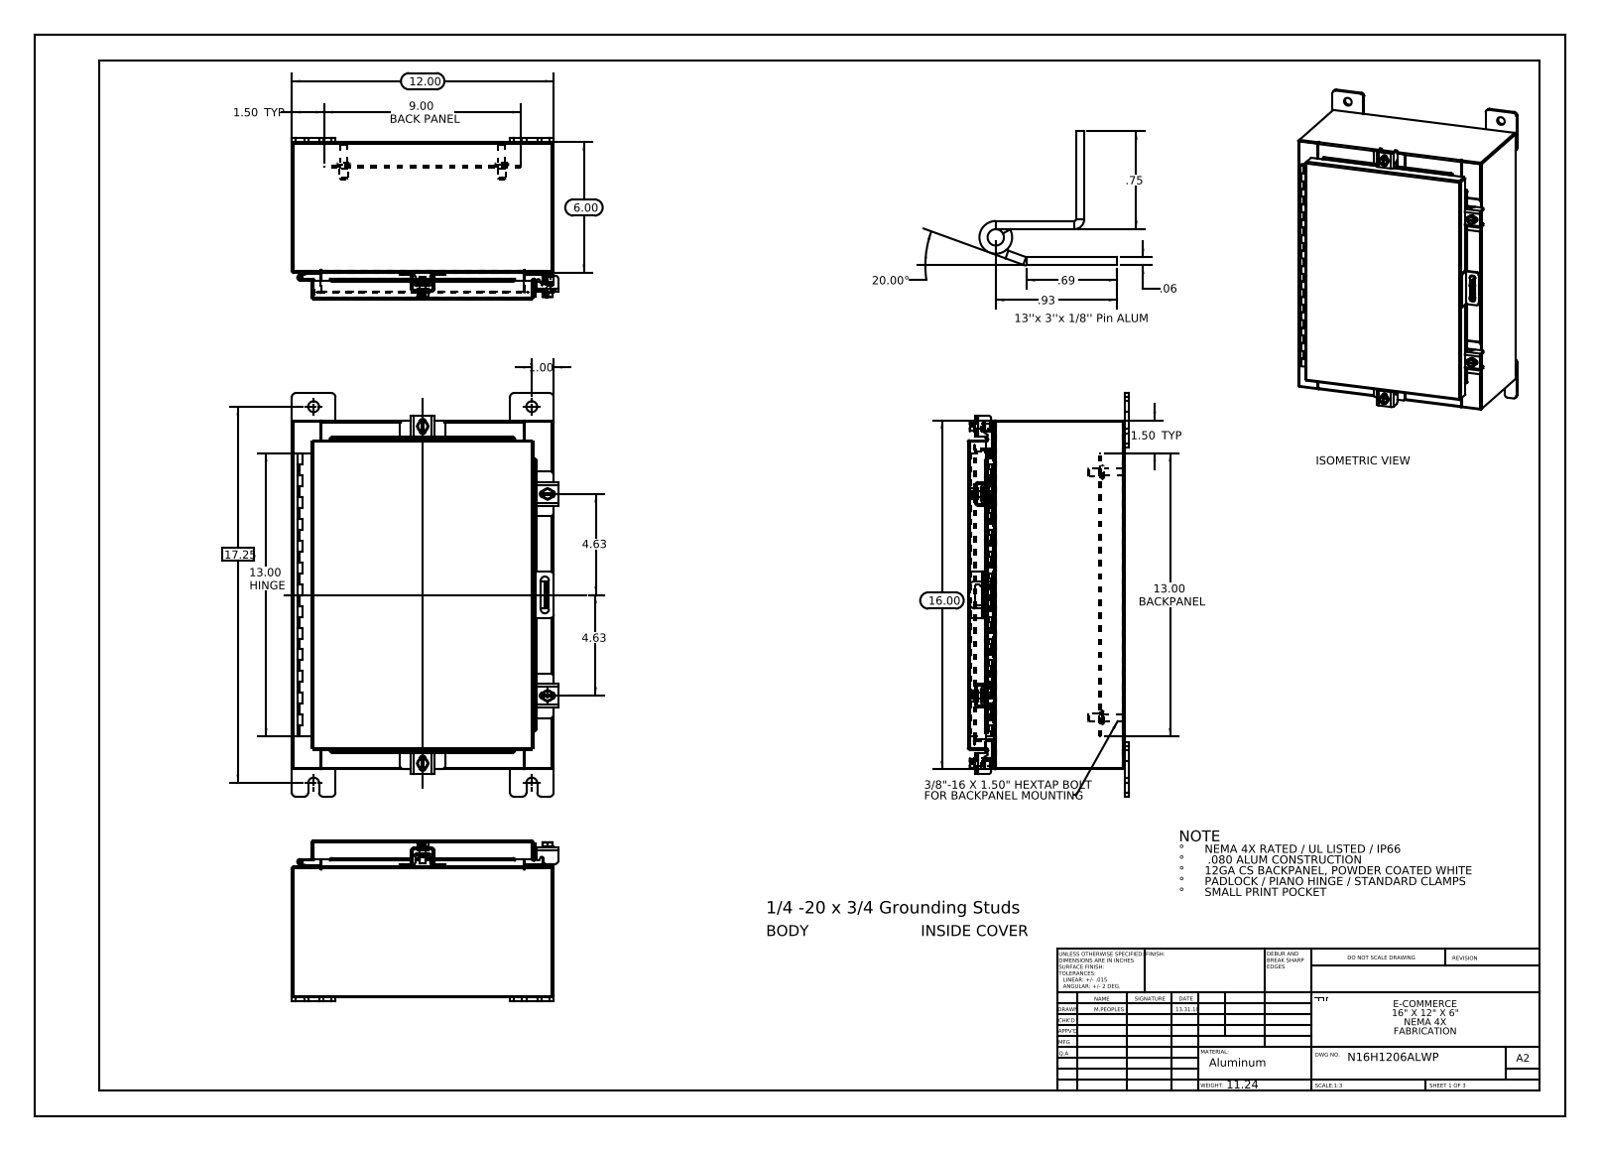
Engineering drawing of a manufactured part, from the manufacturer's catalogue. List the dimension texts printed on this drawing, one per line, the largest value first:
20.00°
17.25
16.00
13.00 HINGE
13.00 BACKPANEL
12.00
9.00 BACK PANEL
6.00
4.63
4.63
1.50 TYP
1.50 TYP
1.00
.93
.75
.69
.06
